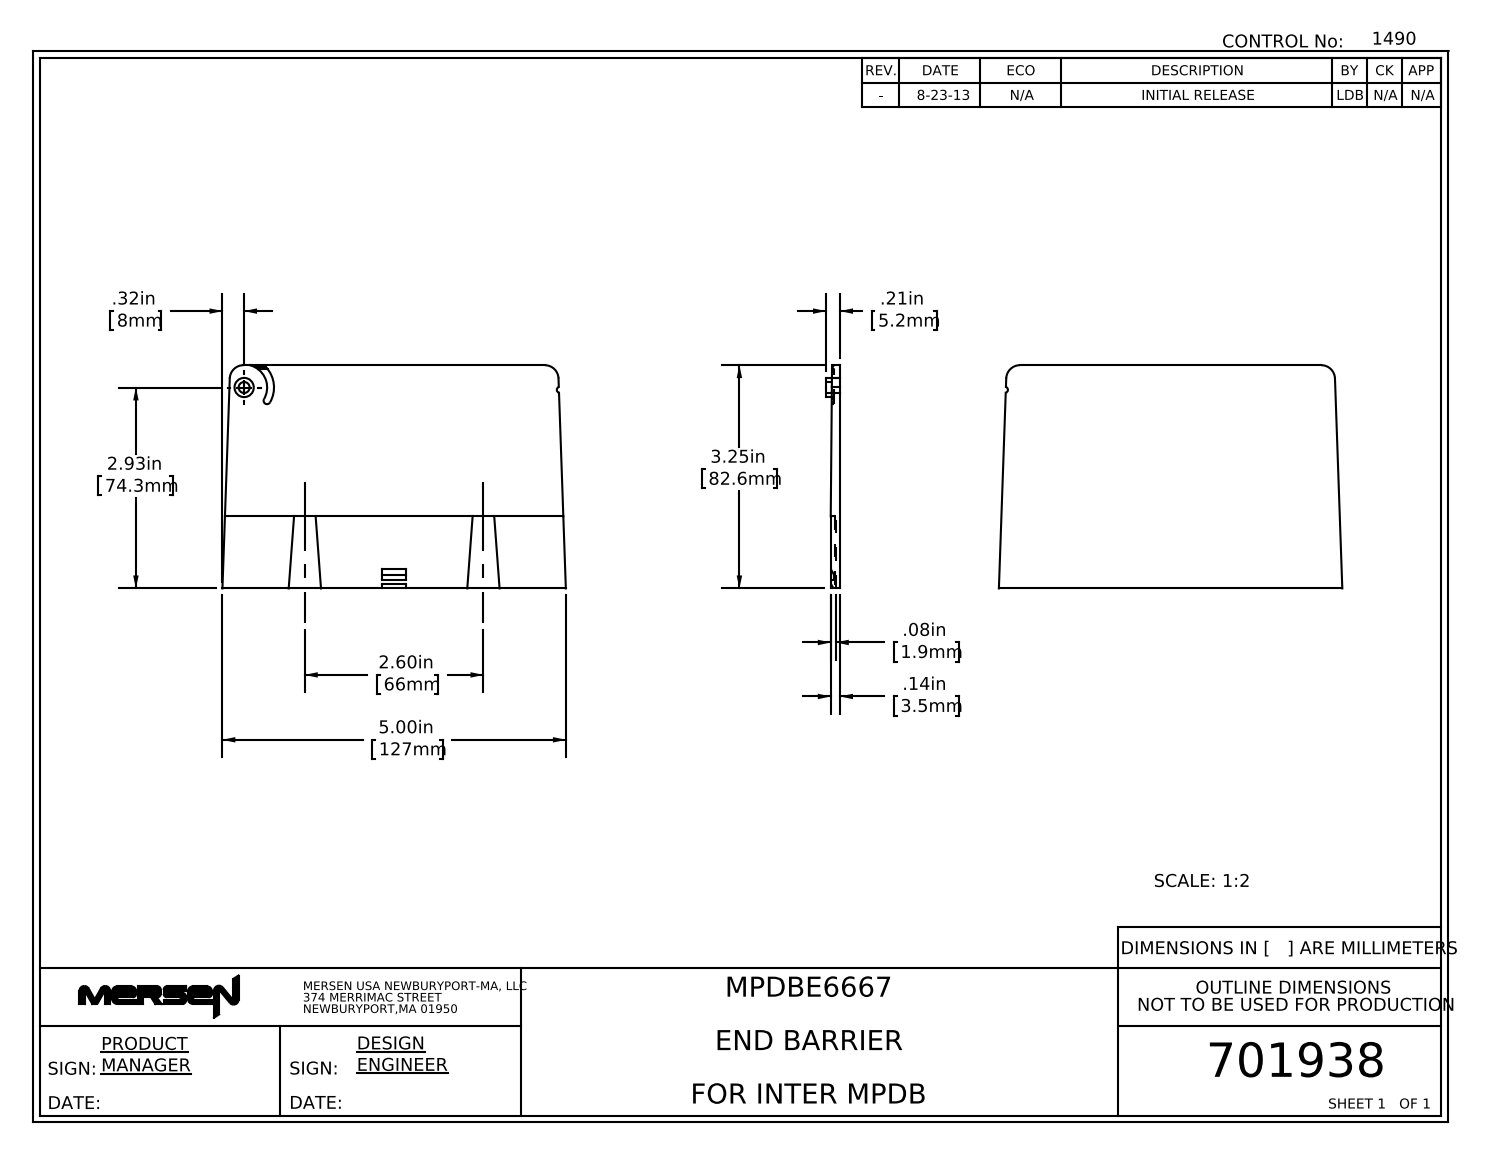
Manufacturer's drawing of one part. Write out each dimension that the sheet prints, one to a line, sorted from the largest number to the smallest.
5.00in 127mm
3.25in 82.6mm
2.93in 74.3mm
2.60in 66mm
.32in 8mm
.21in 5.2mm
.14in 3.5mm
.08in 1.9mm
